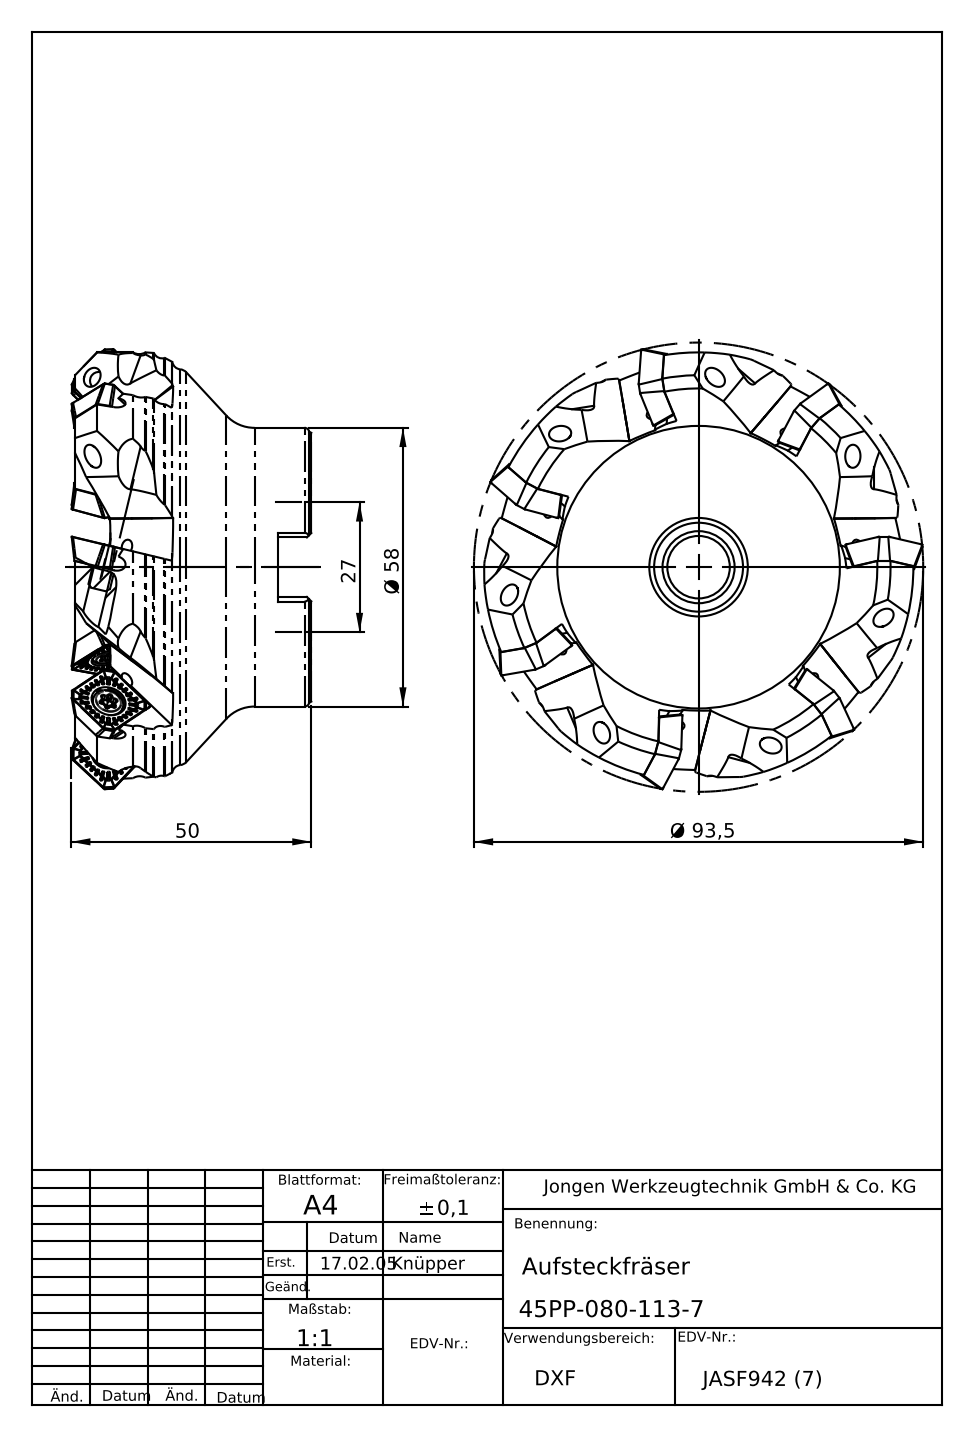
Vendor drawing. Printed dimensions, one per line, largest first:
Ø 93,5
Ø 58
50
27
